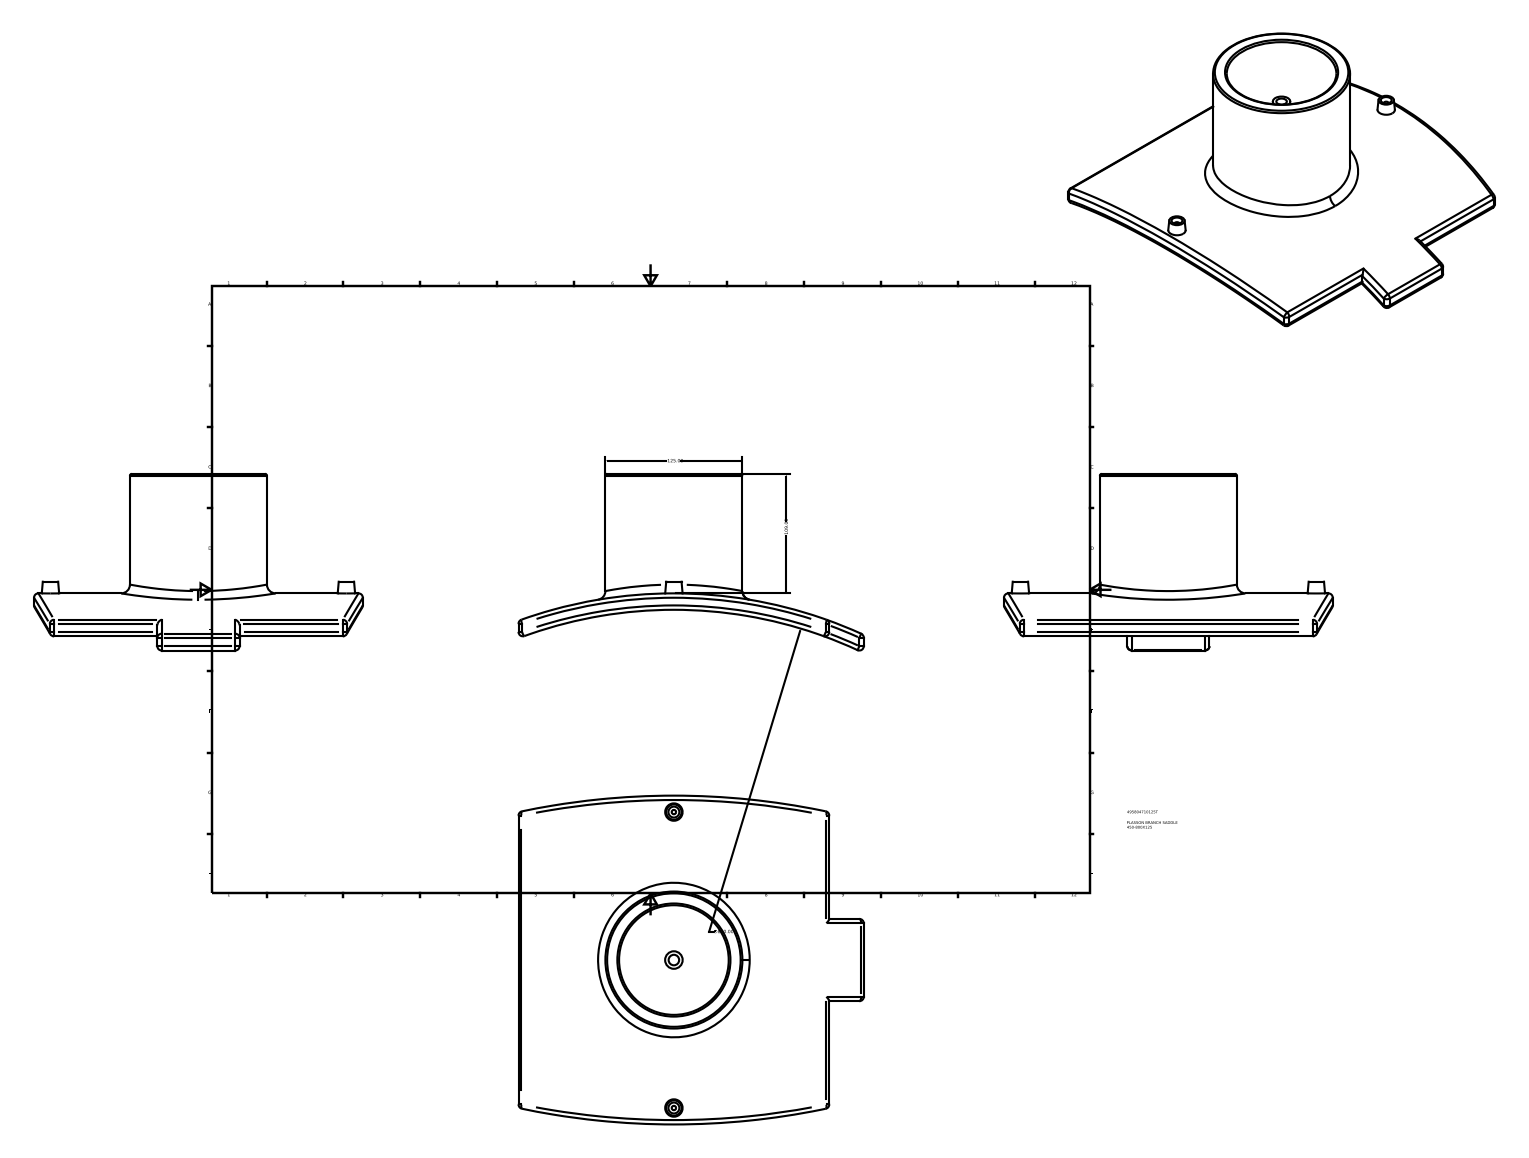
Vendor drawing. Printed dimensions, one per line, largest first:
∅800.00
125.00
109.00
